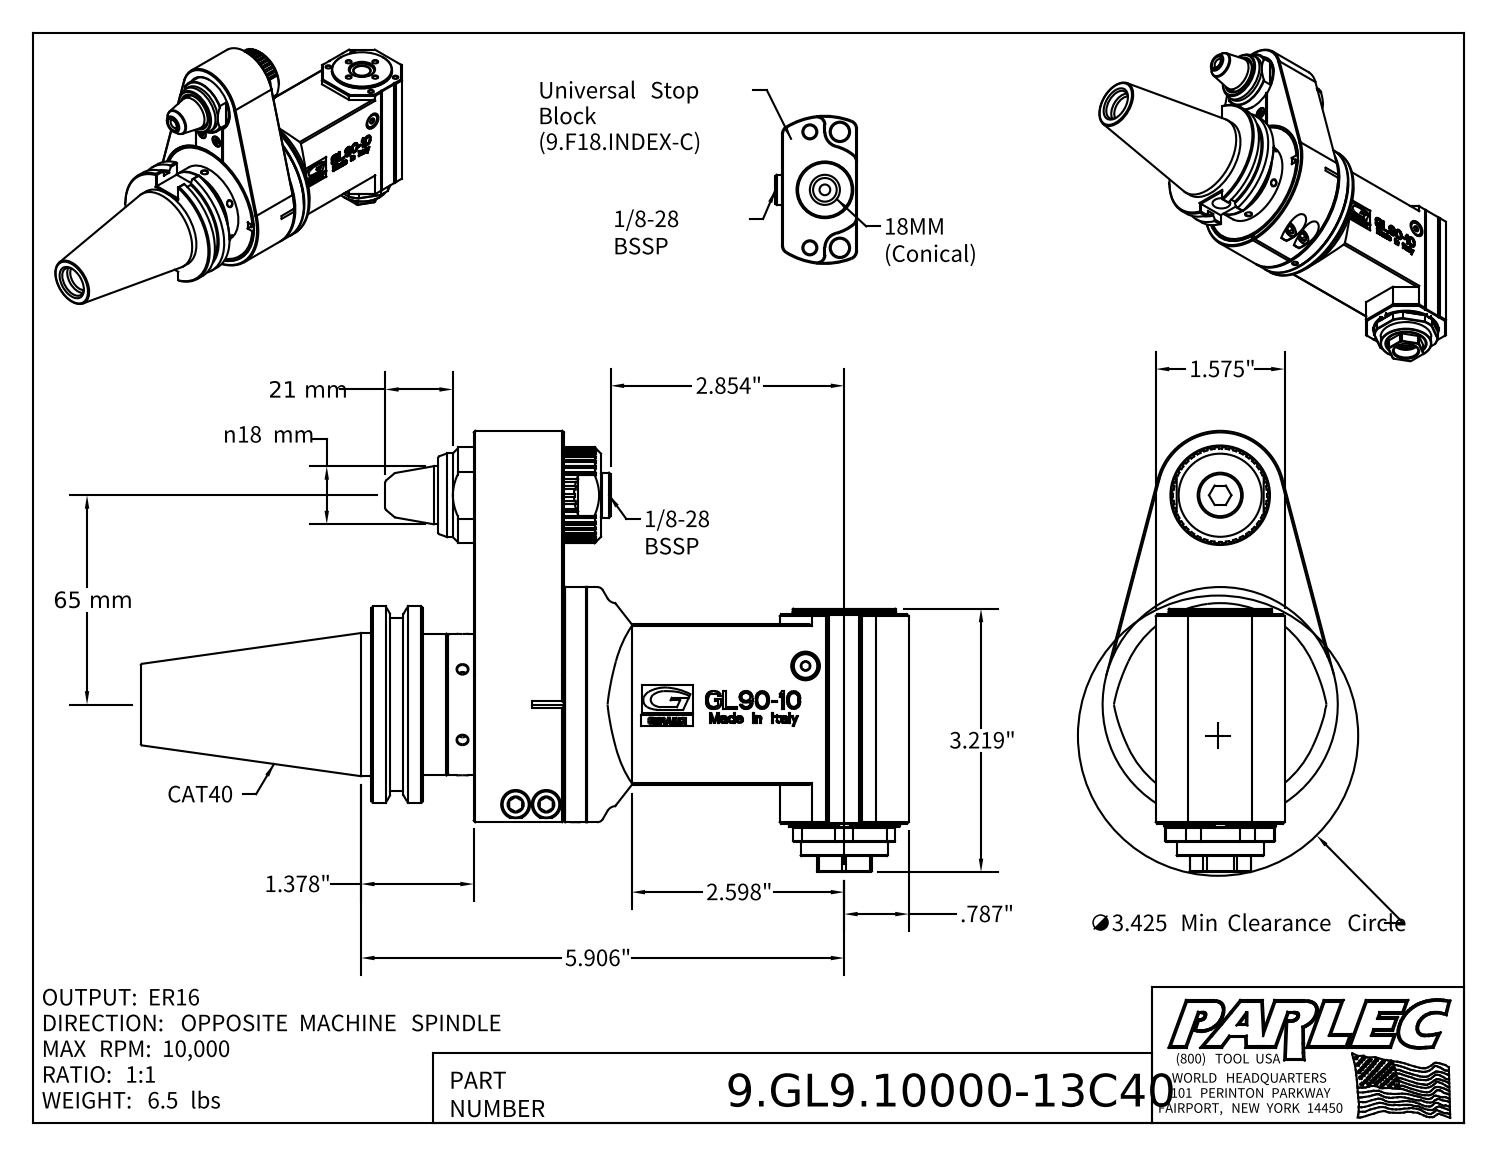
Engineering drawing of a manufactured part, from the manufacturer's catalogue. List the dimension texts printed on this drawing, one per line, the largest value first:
65 mm
21 mm
n18 mm
5.906"
∅3.425 Min Clearance Circle
3.219"
2.854"
2.598"
1.575"
1.378"
.787"
